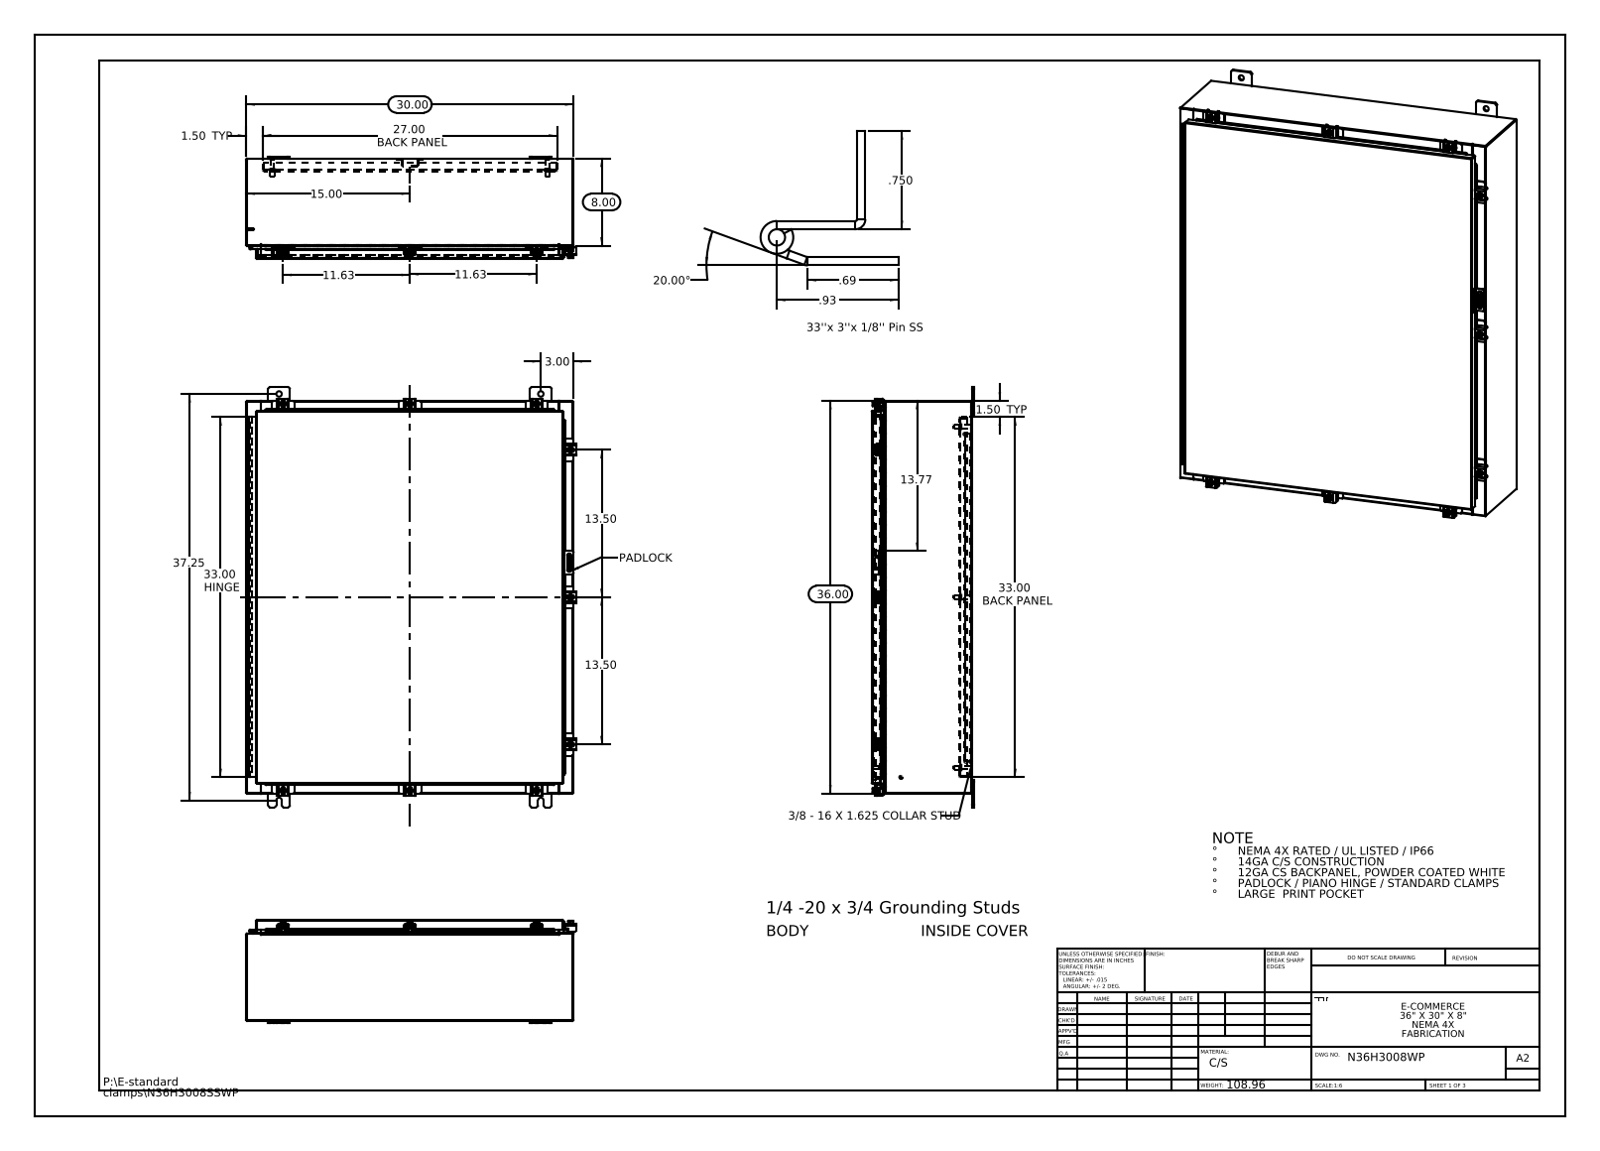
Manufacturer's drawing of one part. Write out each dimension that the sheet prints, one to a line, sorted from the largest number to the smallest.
37.25
36.00
33.00 HINGE
33.00 BACK PANEL
30.00
27.00 BACK PANEL
20.00°
15.00
13.77
13.50
13.50
11.63
11.63
8.00
3.00
1.50 TYP
1.50 TYP
.93
.750
.69
